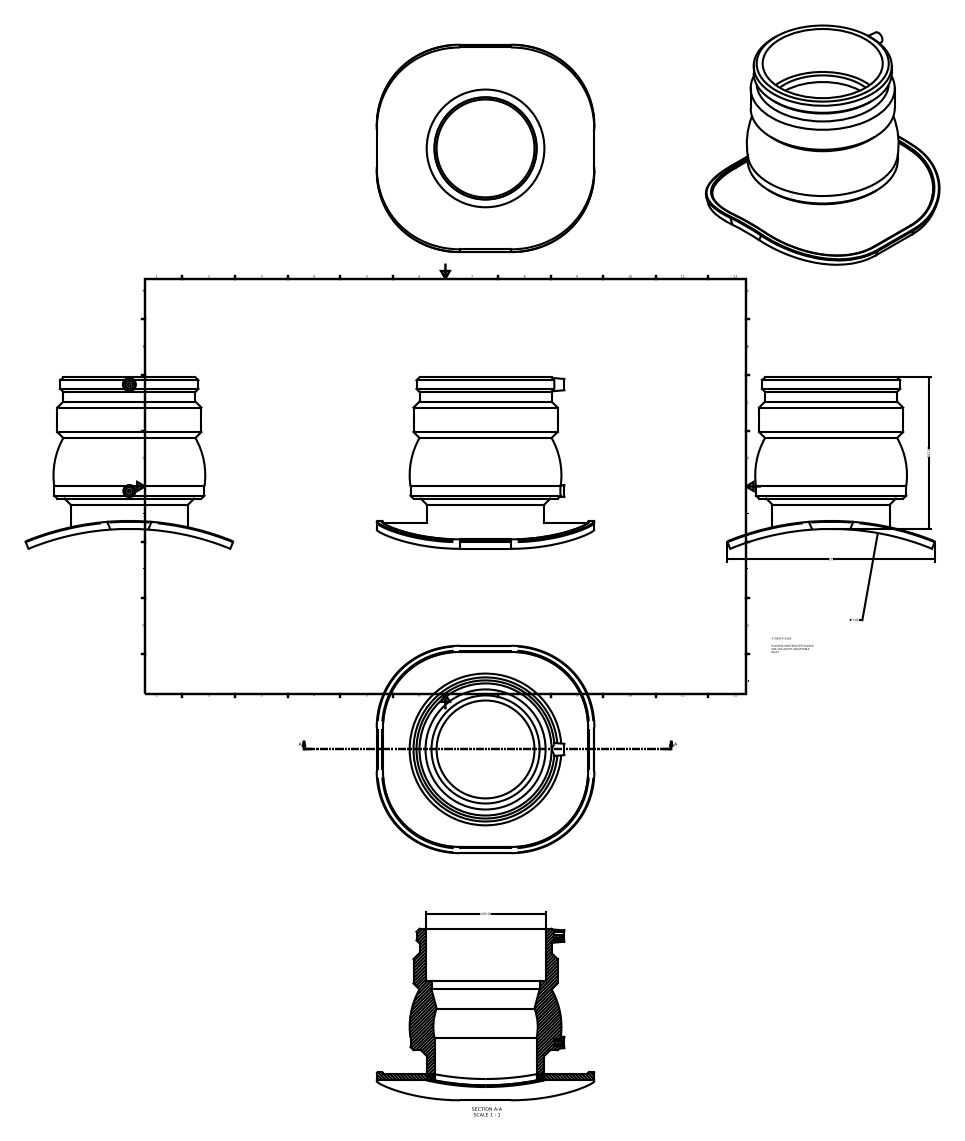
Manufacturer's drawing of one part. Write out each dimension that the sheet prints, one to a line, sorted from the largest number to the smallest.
∅710.0
276
202.00
n160.00
